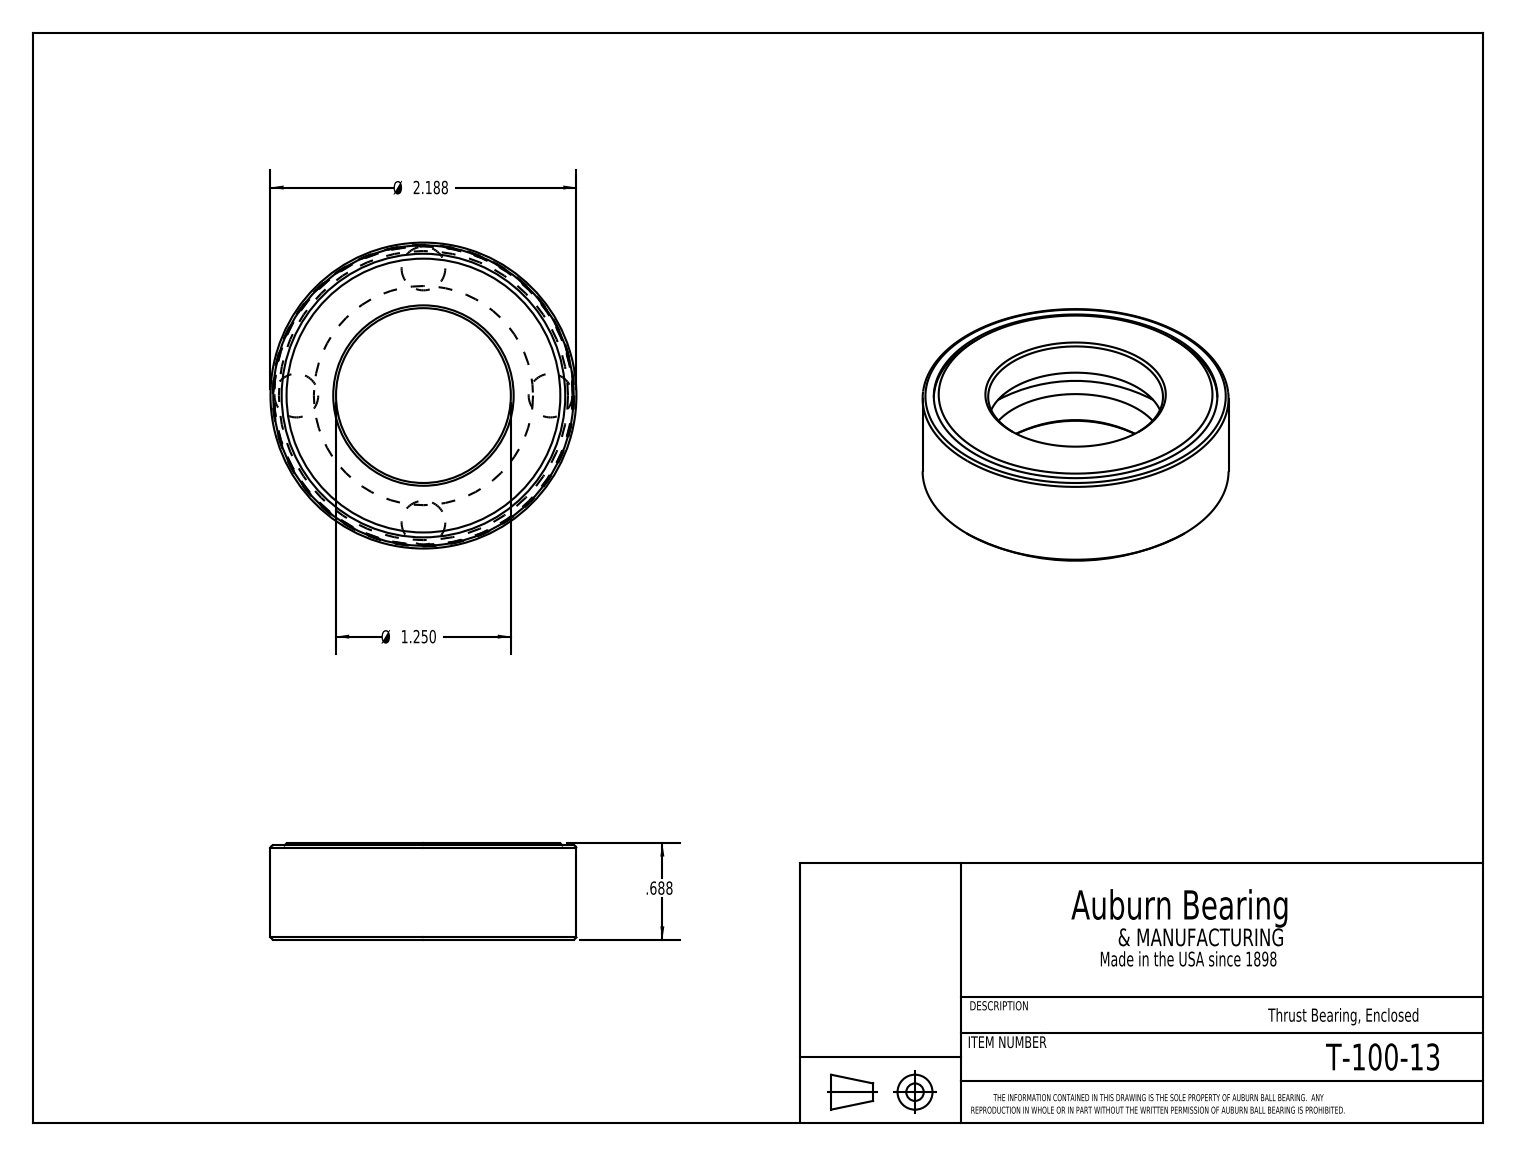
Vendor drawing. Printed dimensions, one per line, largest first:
Ø 2.188
Ø 1.250
.688
